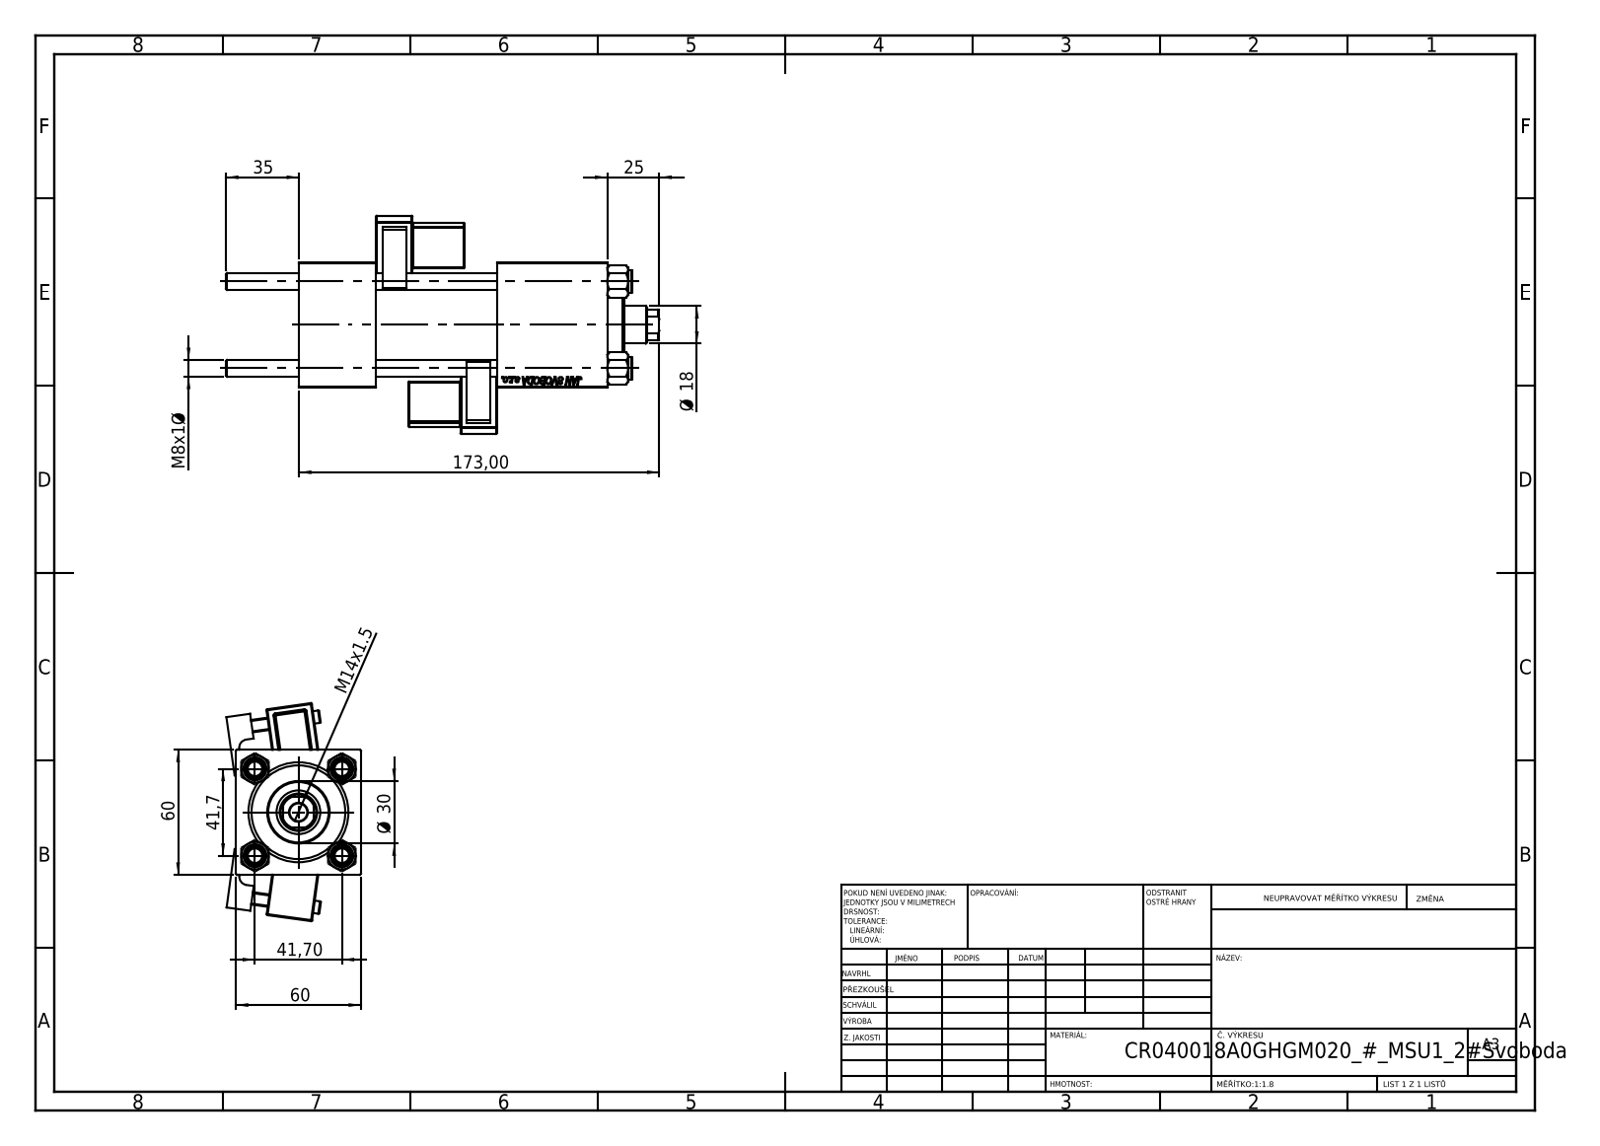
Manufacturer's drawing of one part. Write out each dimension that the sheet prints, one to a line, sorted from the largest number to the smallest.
173,00
60
60
41,7
41,70
35
Ø 30
25
Ø 18
M14x1.5
M8x1 Ø
